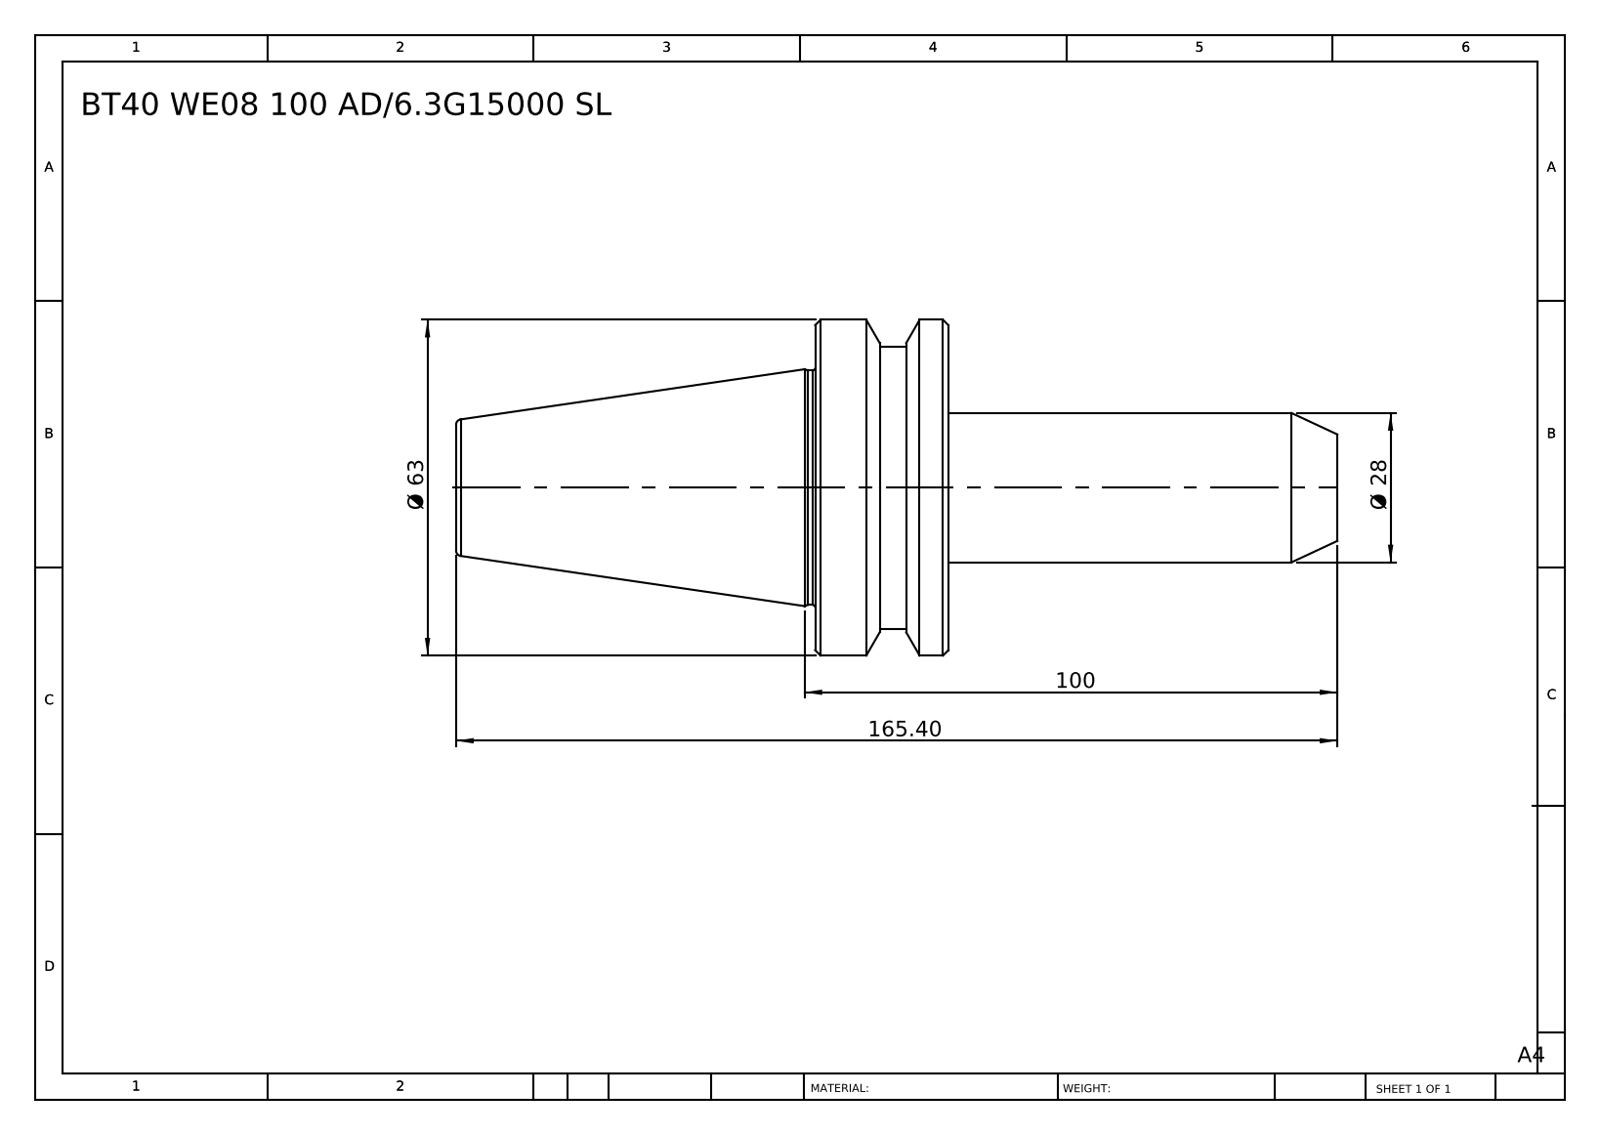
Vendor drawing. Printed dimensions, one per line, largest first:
165.40
100
Ø 63
Ø 28
